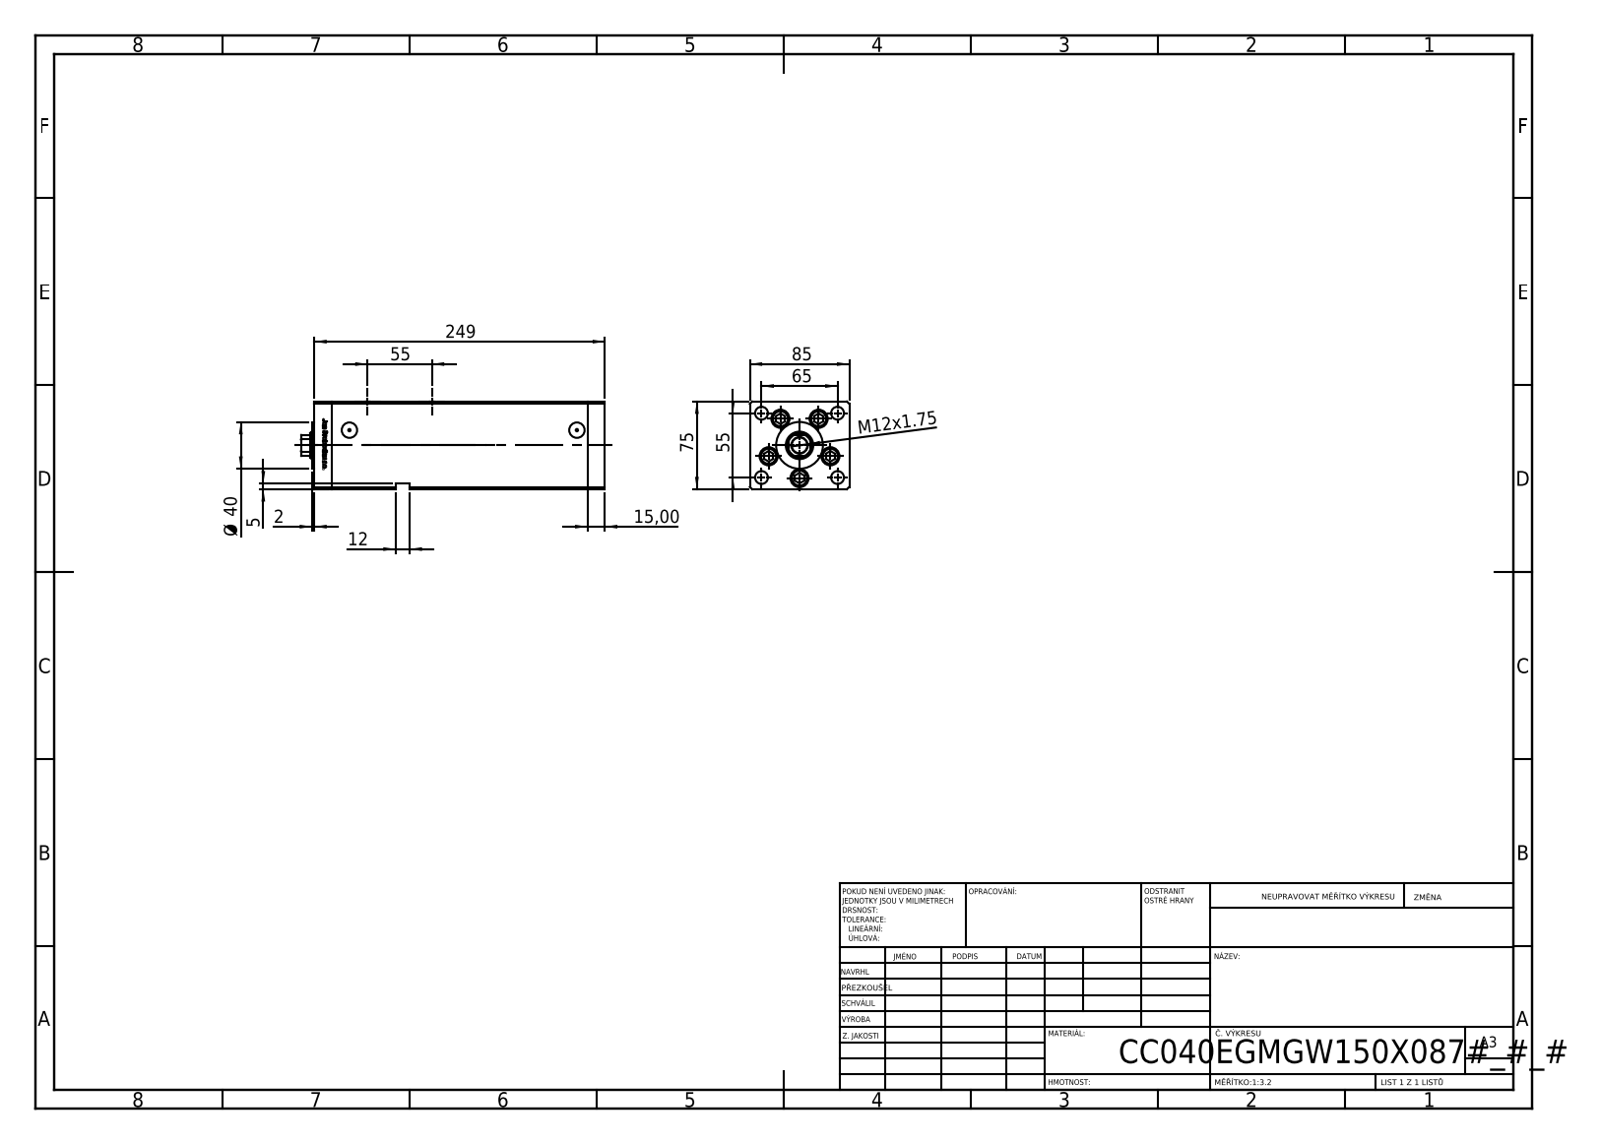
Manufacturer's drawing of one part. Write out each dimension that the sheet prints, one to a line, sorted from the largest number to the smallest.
249
85
75
65
55
55
Ø 40
15,00
12
M12x1.75
5
2
